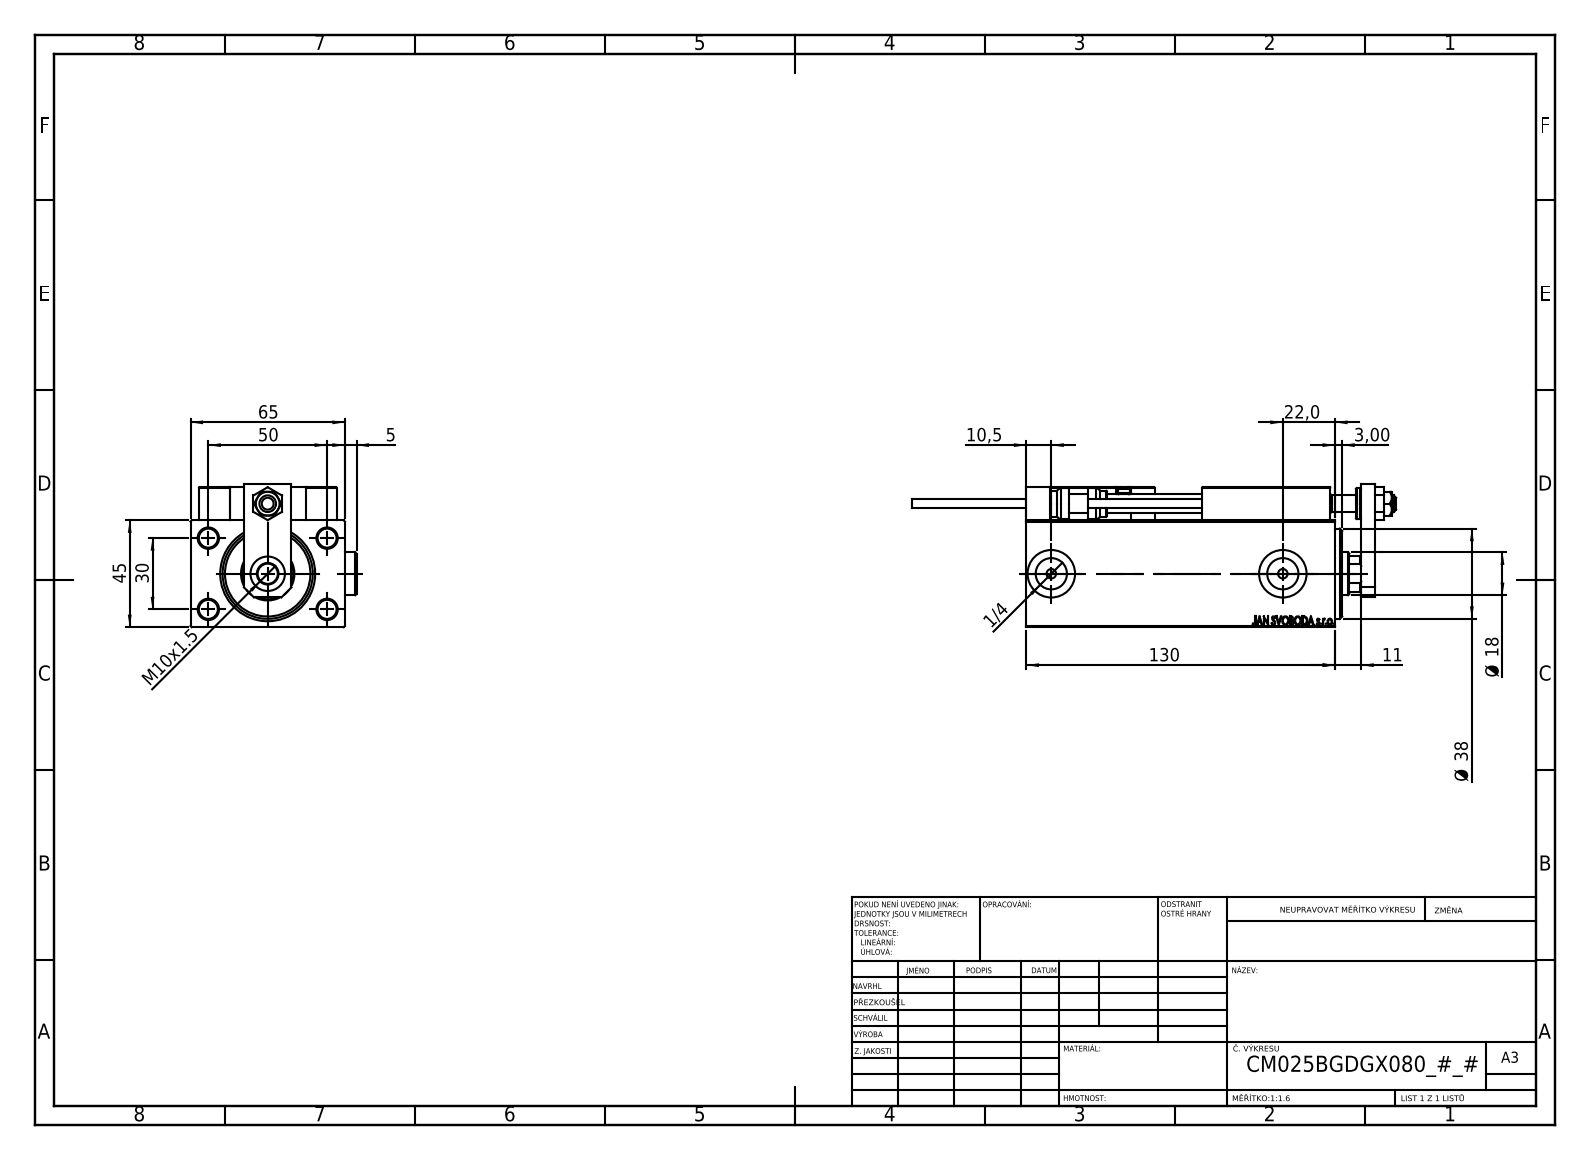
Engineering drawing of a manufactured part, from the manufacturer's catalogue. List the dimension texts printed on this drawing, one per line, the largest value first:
130
65
50
45
Ø 38
30
22,0
Ø 18
11
10,5
M10x1.5
5
3,00
1/4
